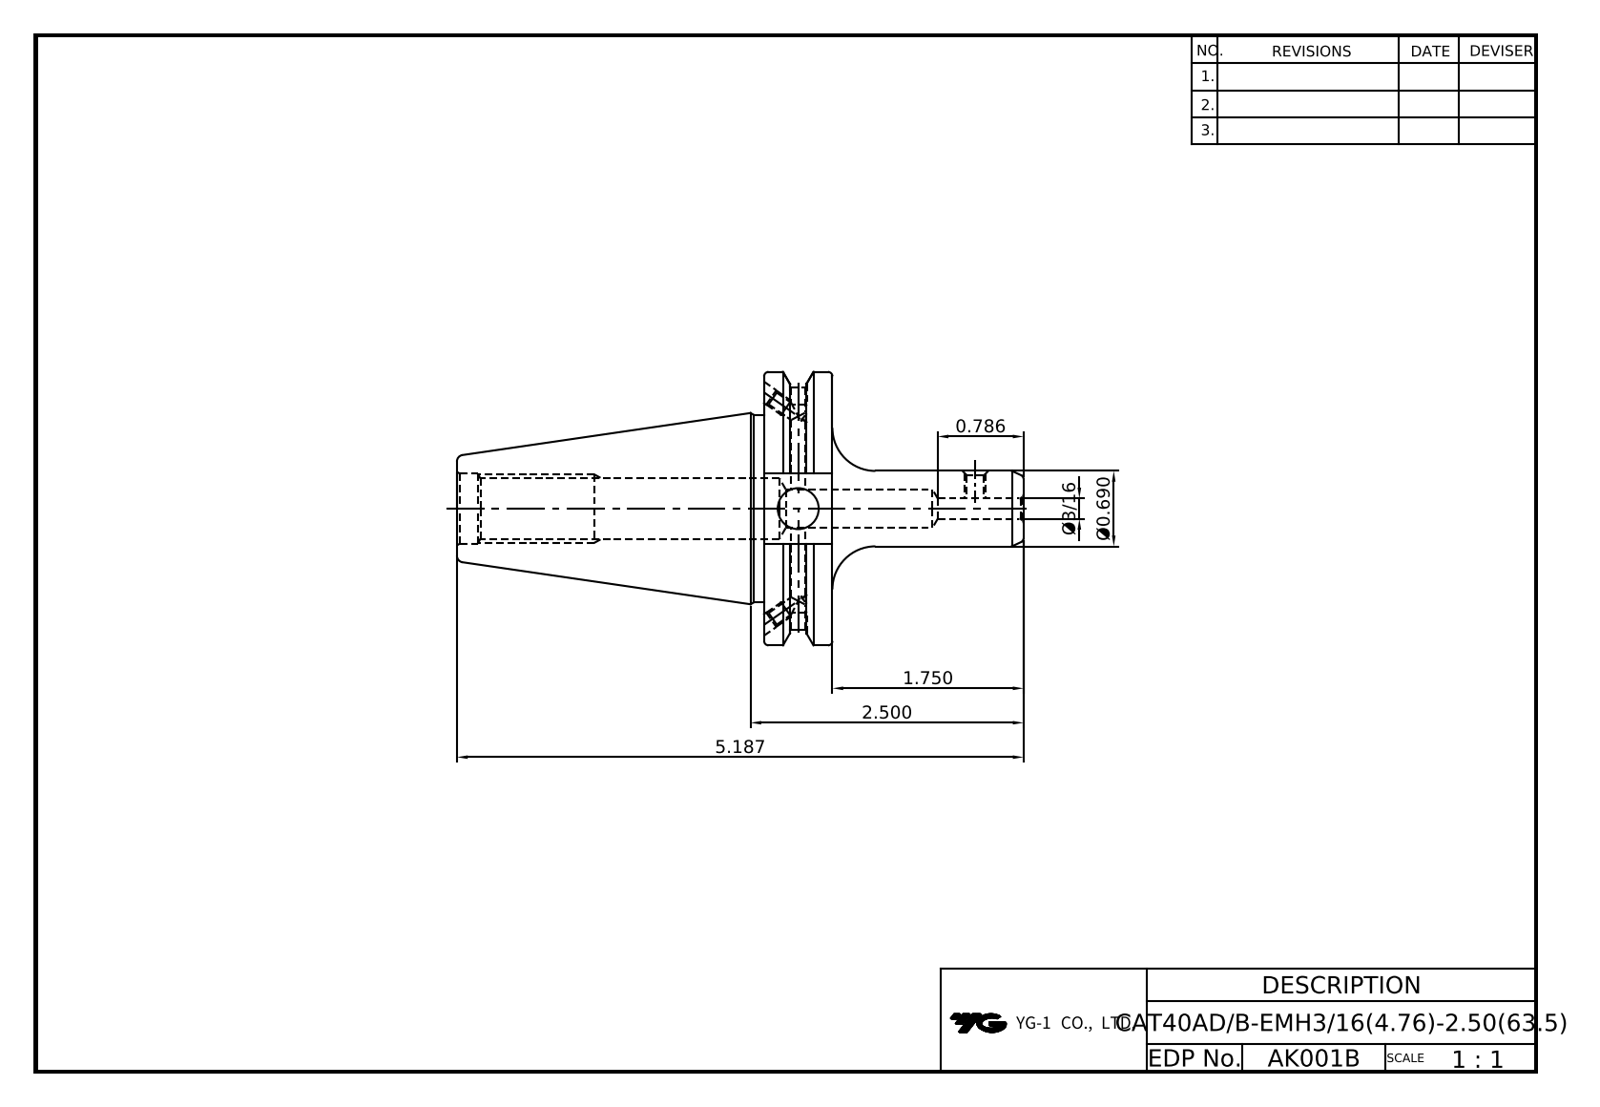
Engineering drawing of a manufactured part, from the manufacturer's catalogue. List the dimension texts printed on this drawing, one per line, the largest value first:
5.187
2.500
1.750
0.786
Ø0.690
Ø3/16
